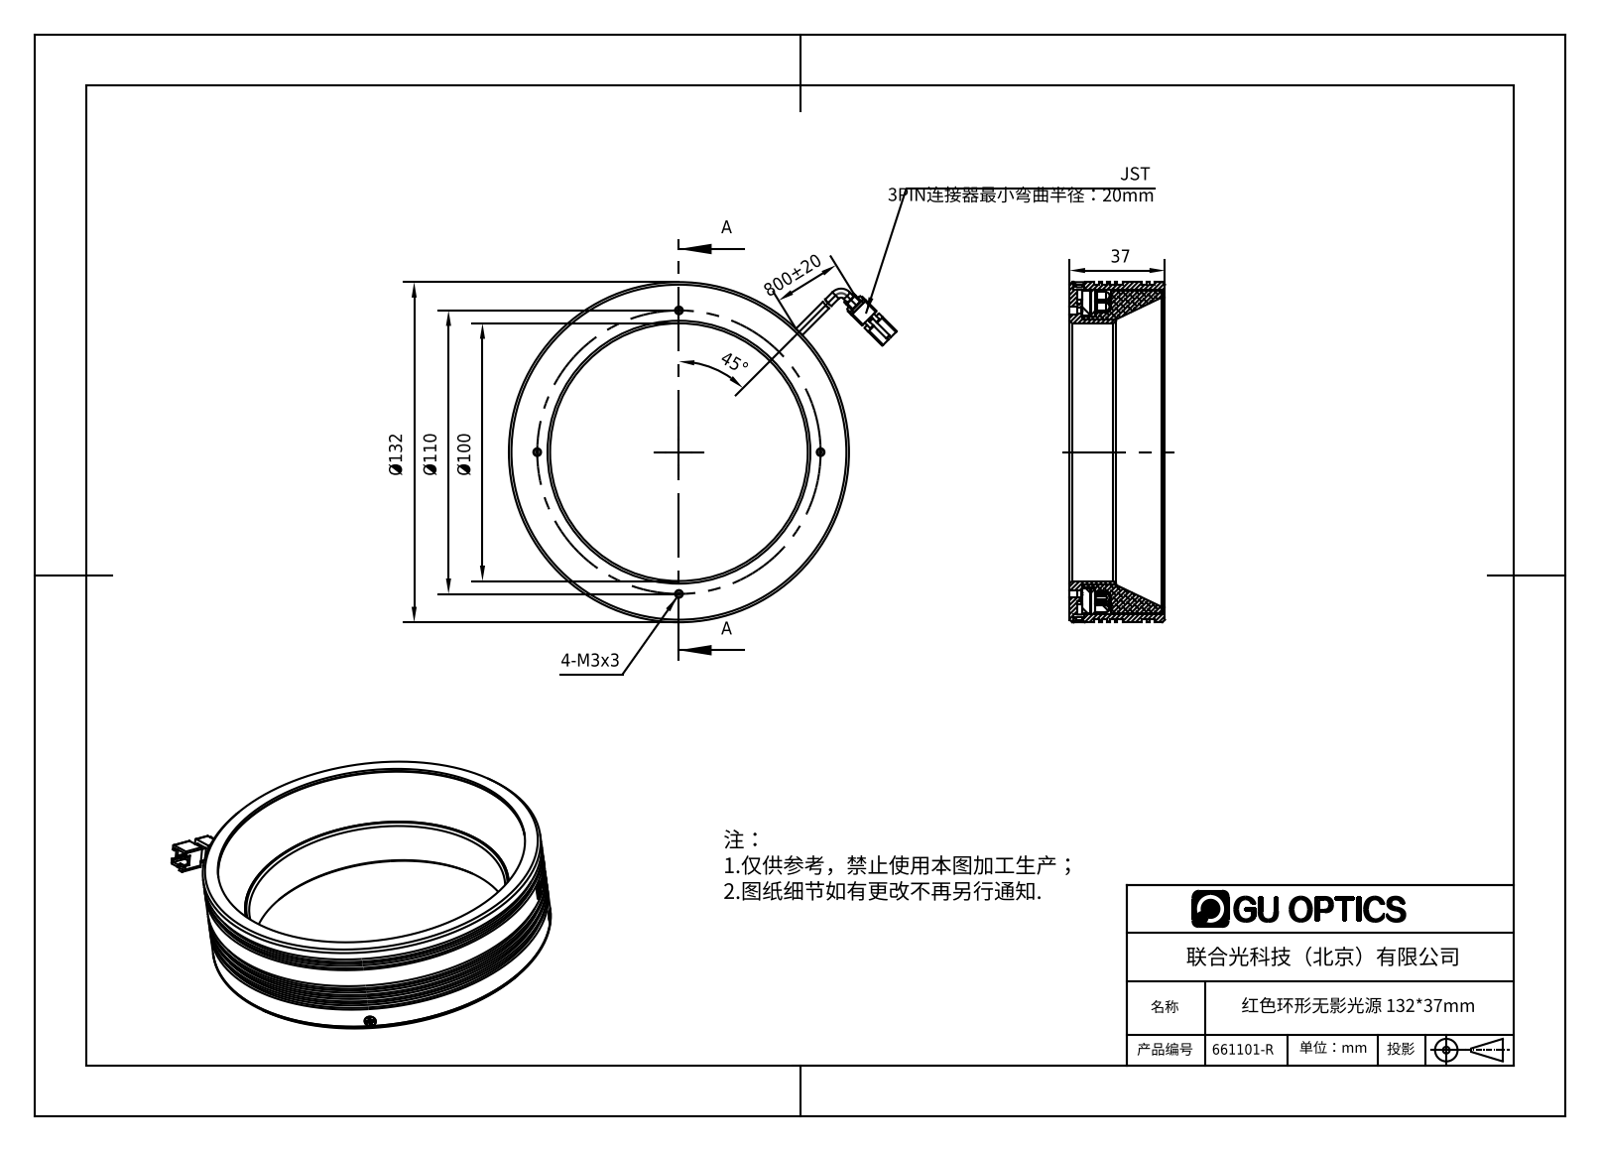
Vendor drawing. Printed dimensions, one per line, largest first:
800±20
Ø132
Ø110
Ø100
45°
37
